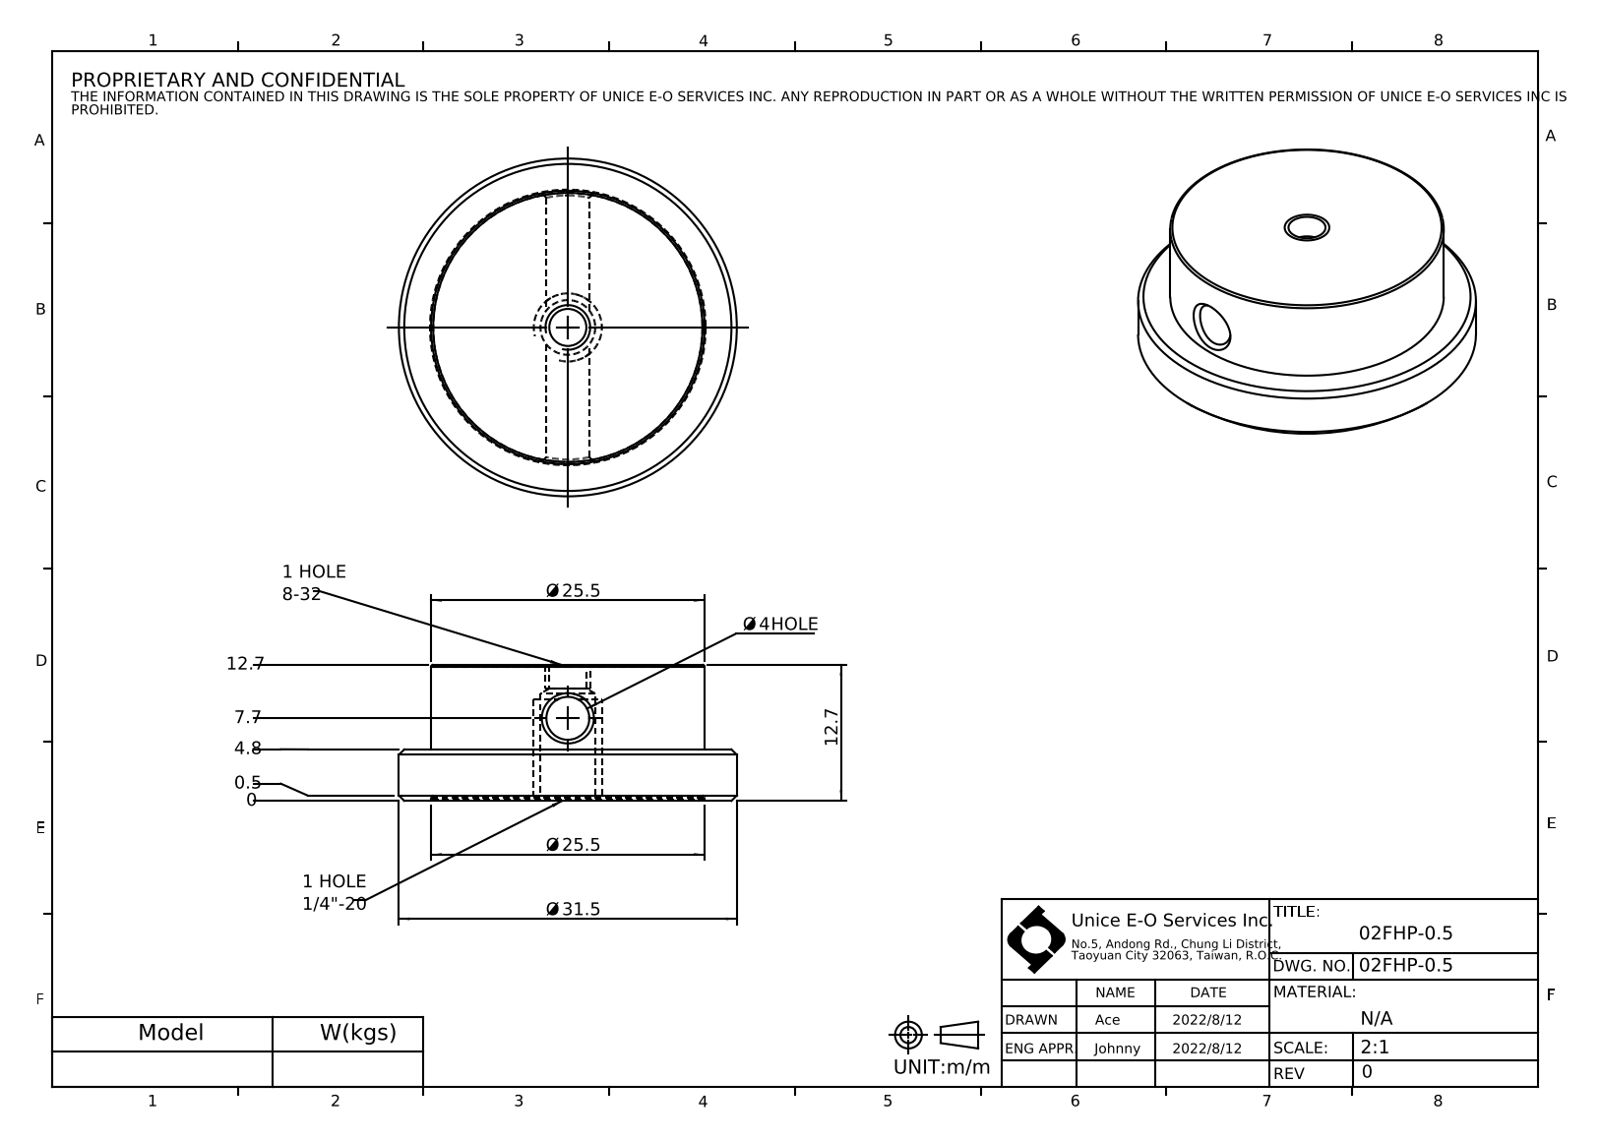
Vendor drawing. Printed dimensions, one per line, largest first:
Ø 31.5
Ø 25.5
Ø 25.5
12.7
12.7
7.7
4.8
Ø 4 HOLE
0.5
0
